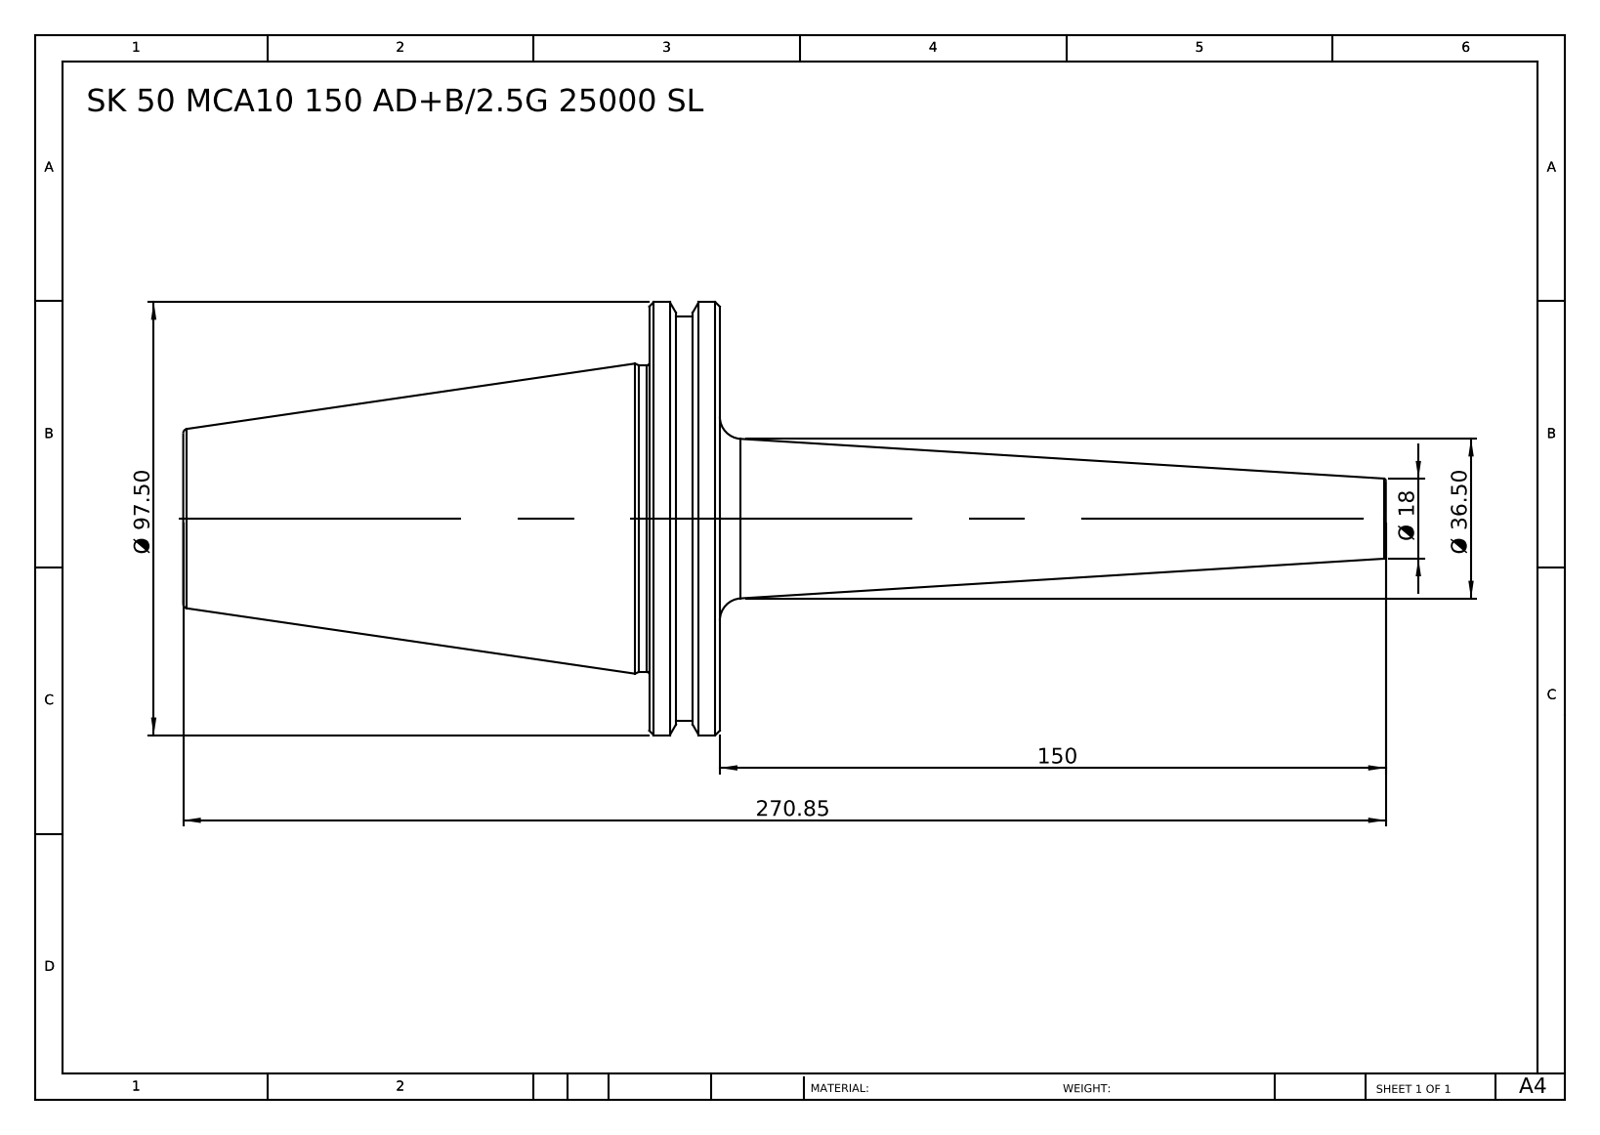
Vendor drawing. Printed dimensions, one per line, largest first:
270.85
150
Ø 97.50
Ø 36.50
Ø 18
